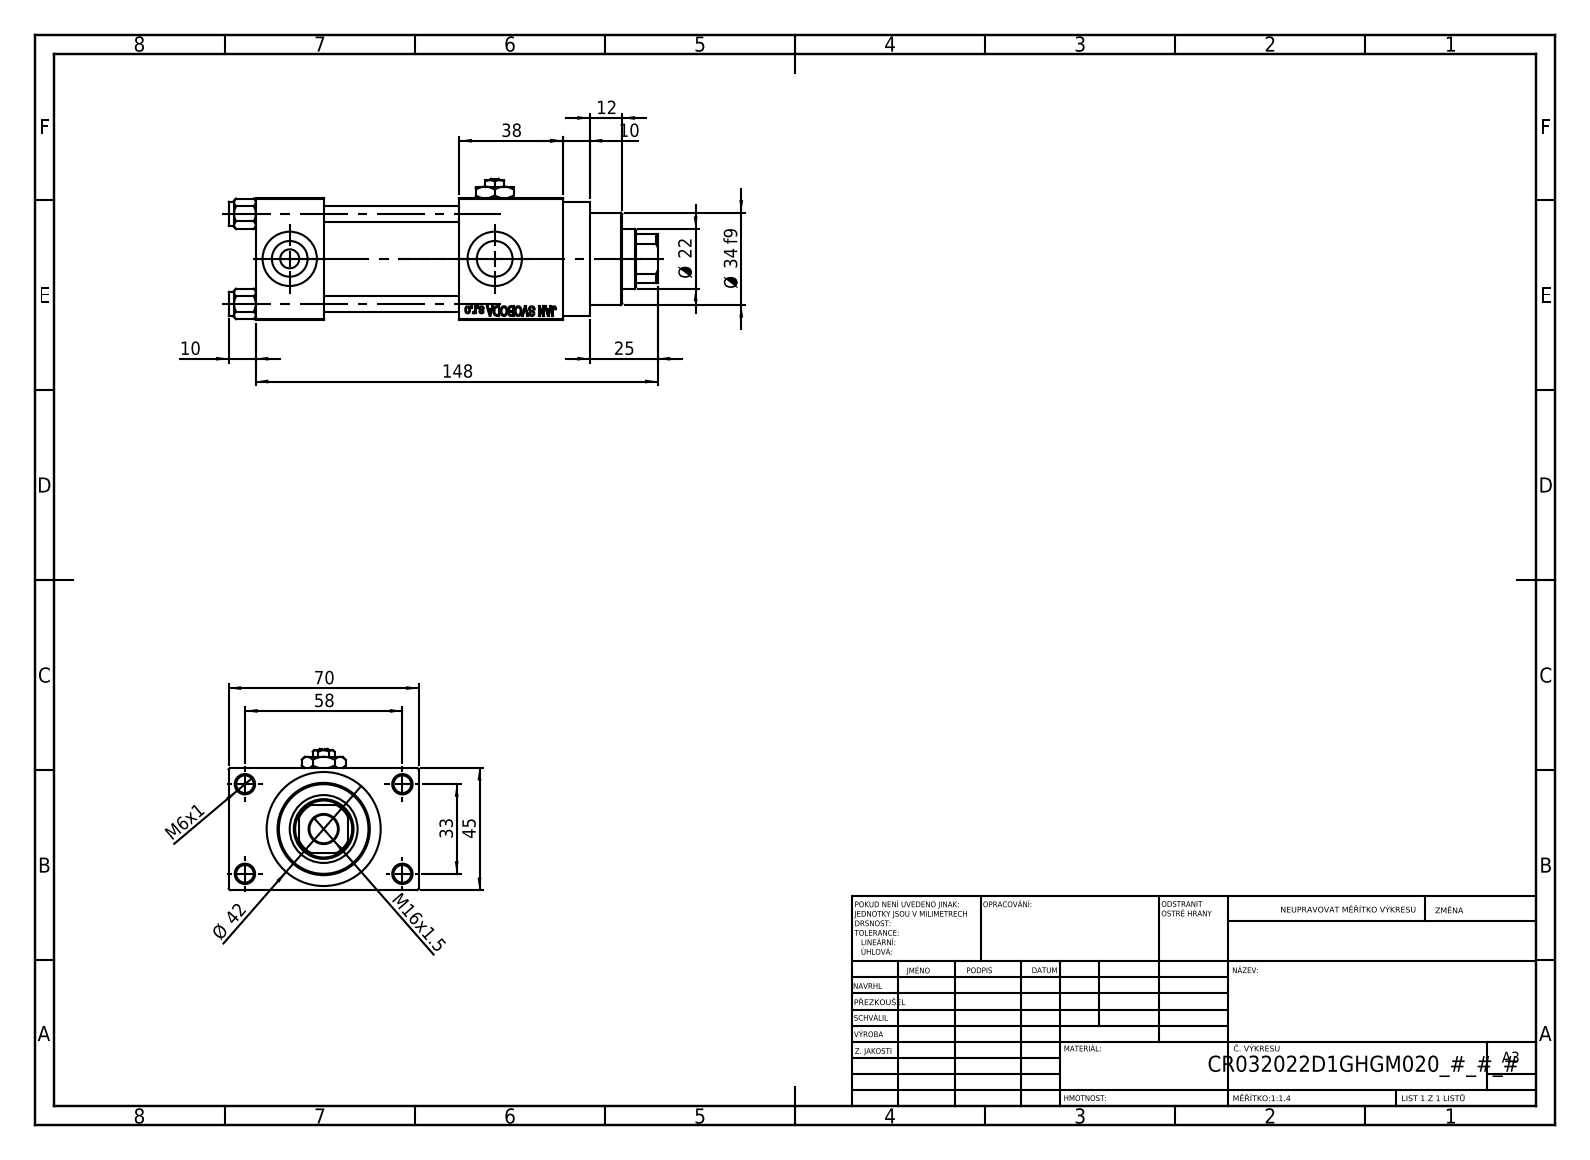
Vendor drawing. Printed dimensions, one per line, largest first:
148
70
58
45
Ø 42
38
Ø 34 f9
33
25
Ø 22
M16x1.5
12
10
10
M6x1
